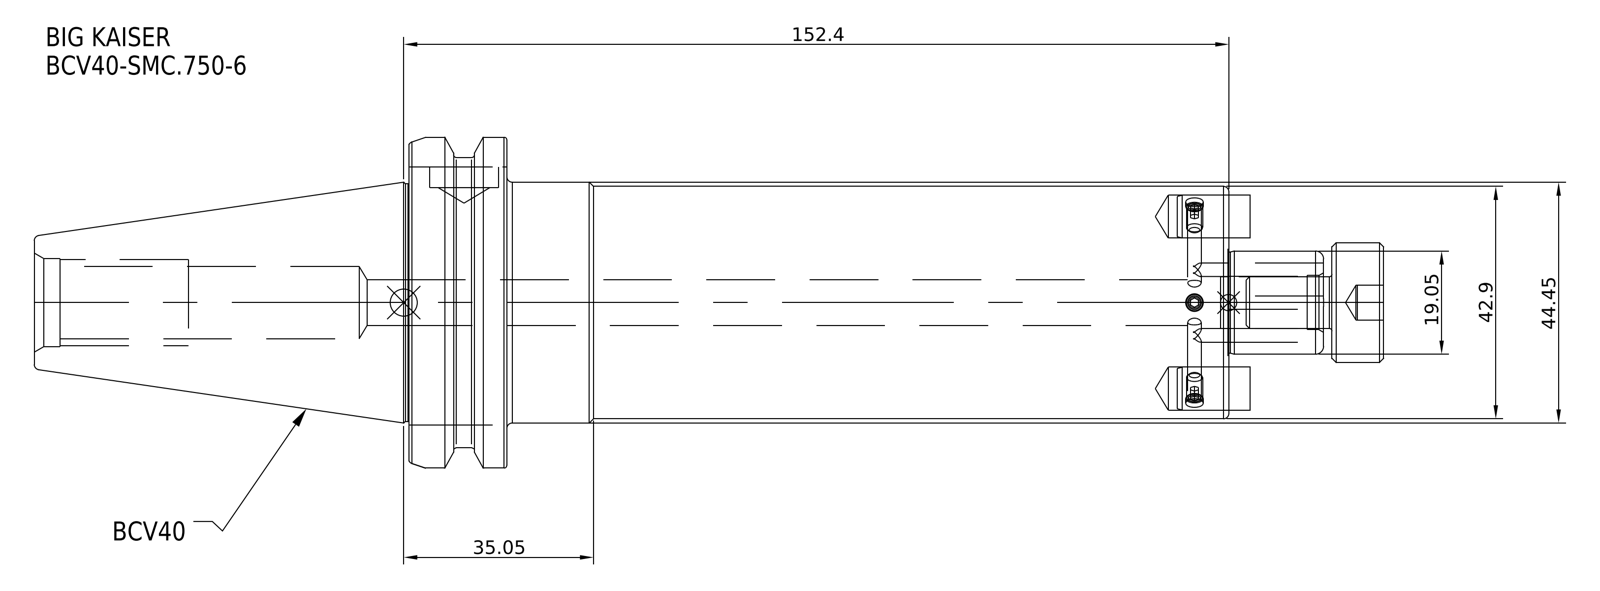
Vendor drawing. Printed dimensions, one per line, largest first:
152.4
44.45
42.9
35.05
19.05
